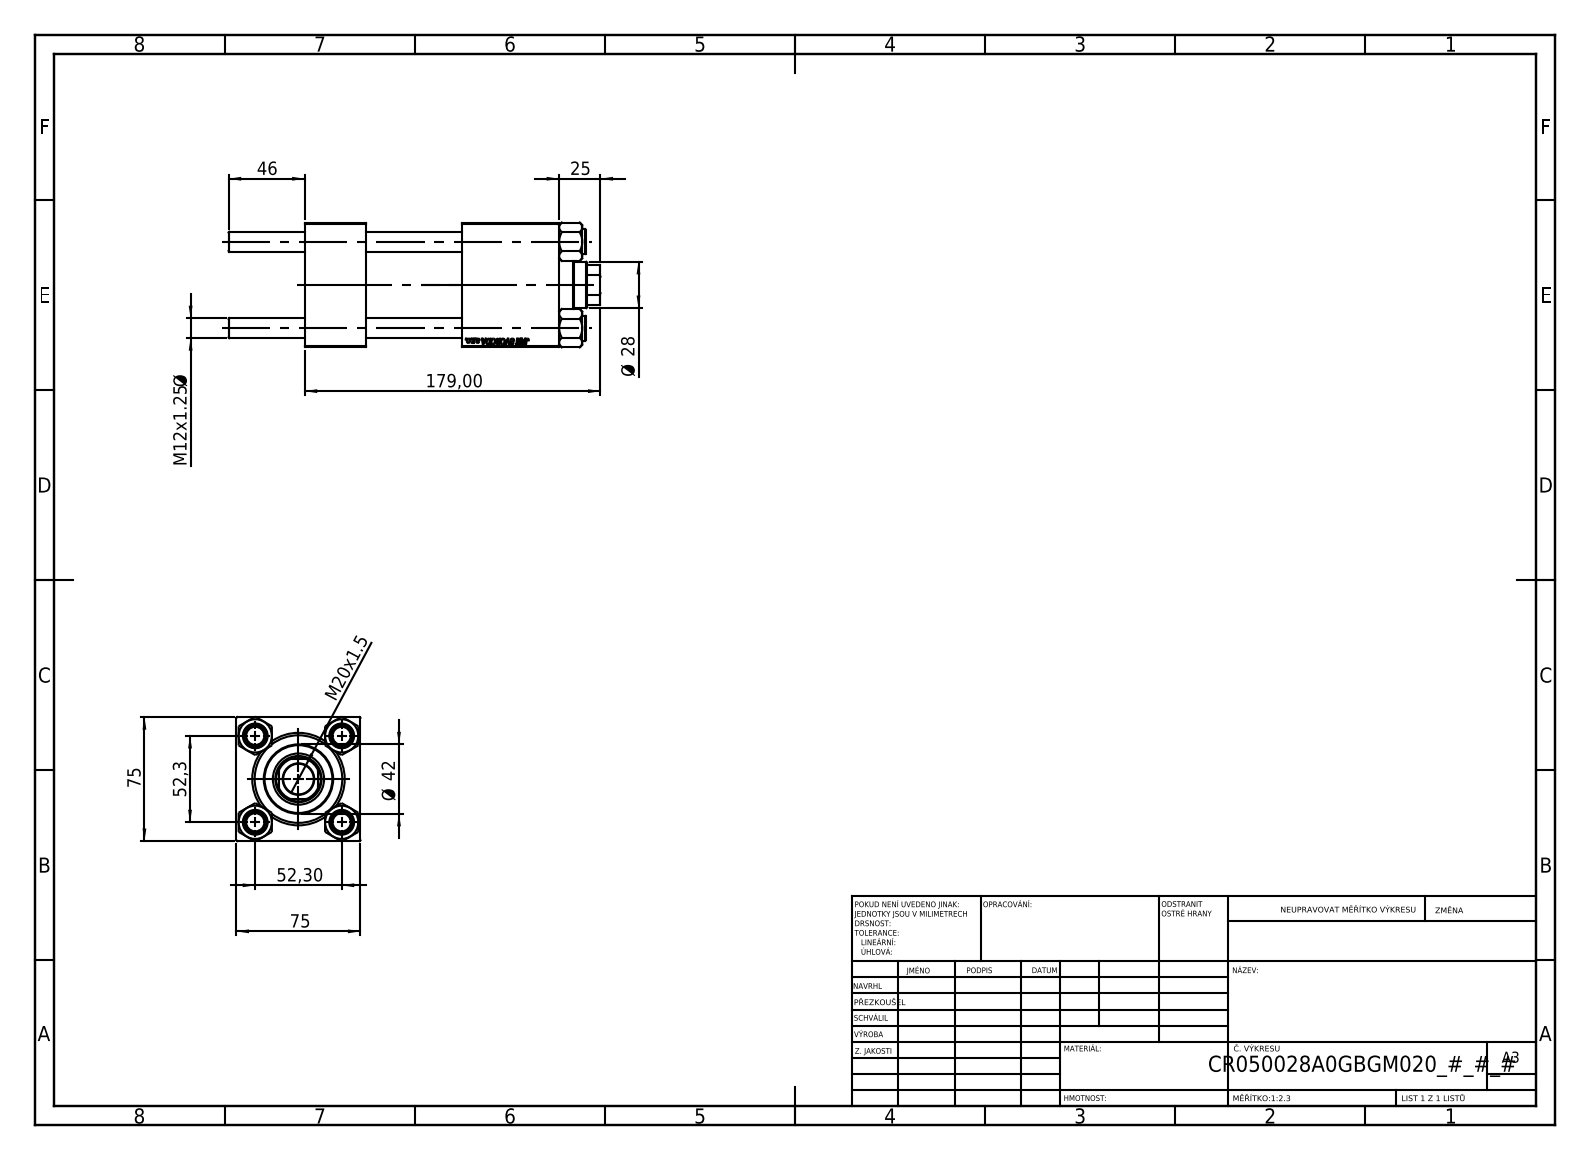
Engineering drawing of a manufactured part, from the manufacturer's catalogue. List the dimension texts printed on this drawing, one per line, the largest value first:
179,00
75
75
52,3
52,30
46
Ø 42
Ø 28
25
M20x1.5
M12x1.25 Ø
